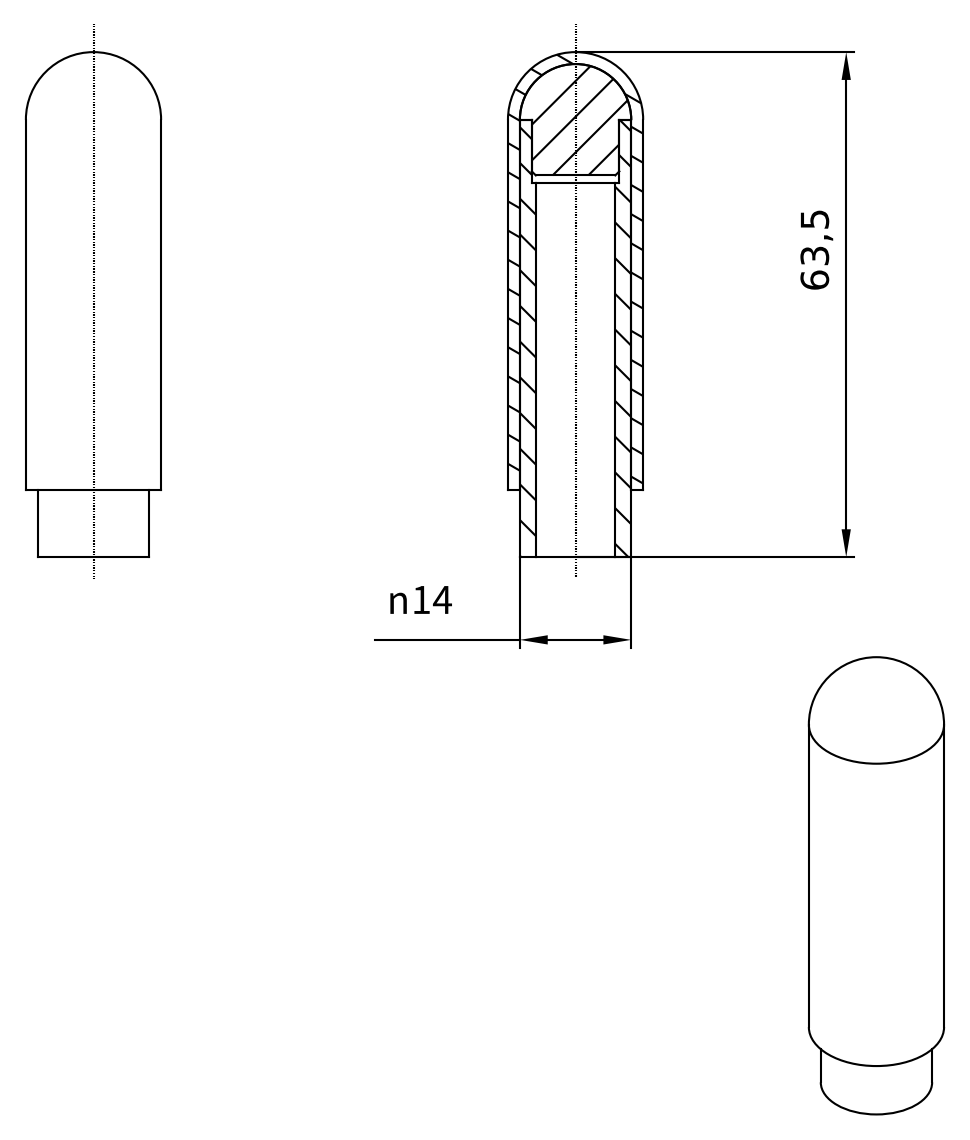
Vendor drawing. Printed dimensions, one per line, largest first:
63,5
n14
